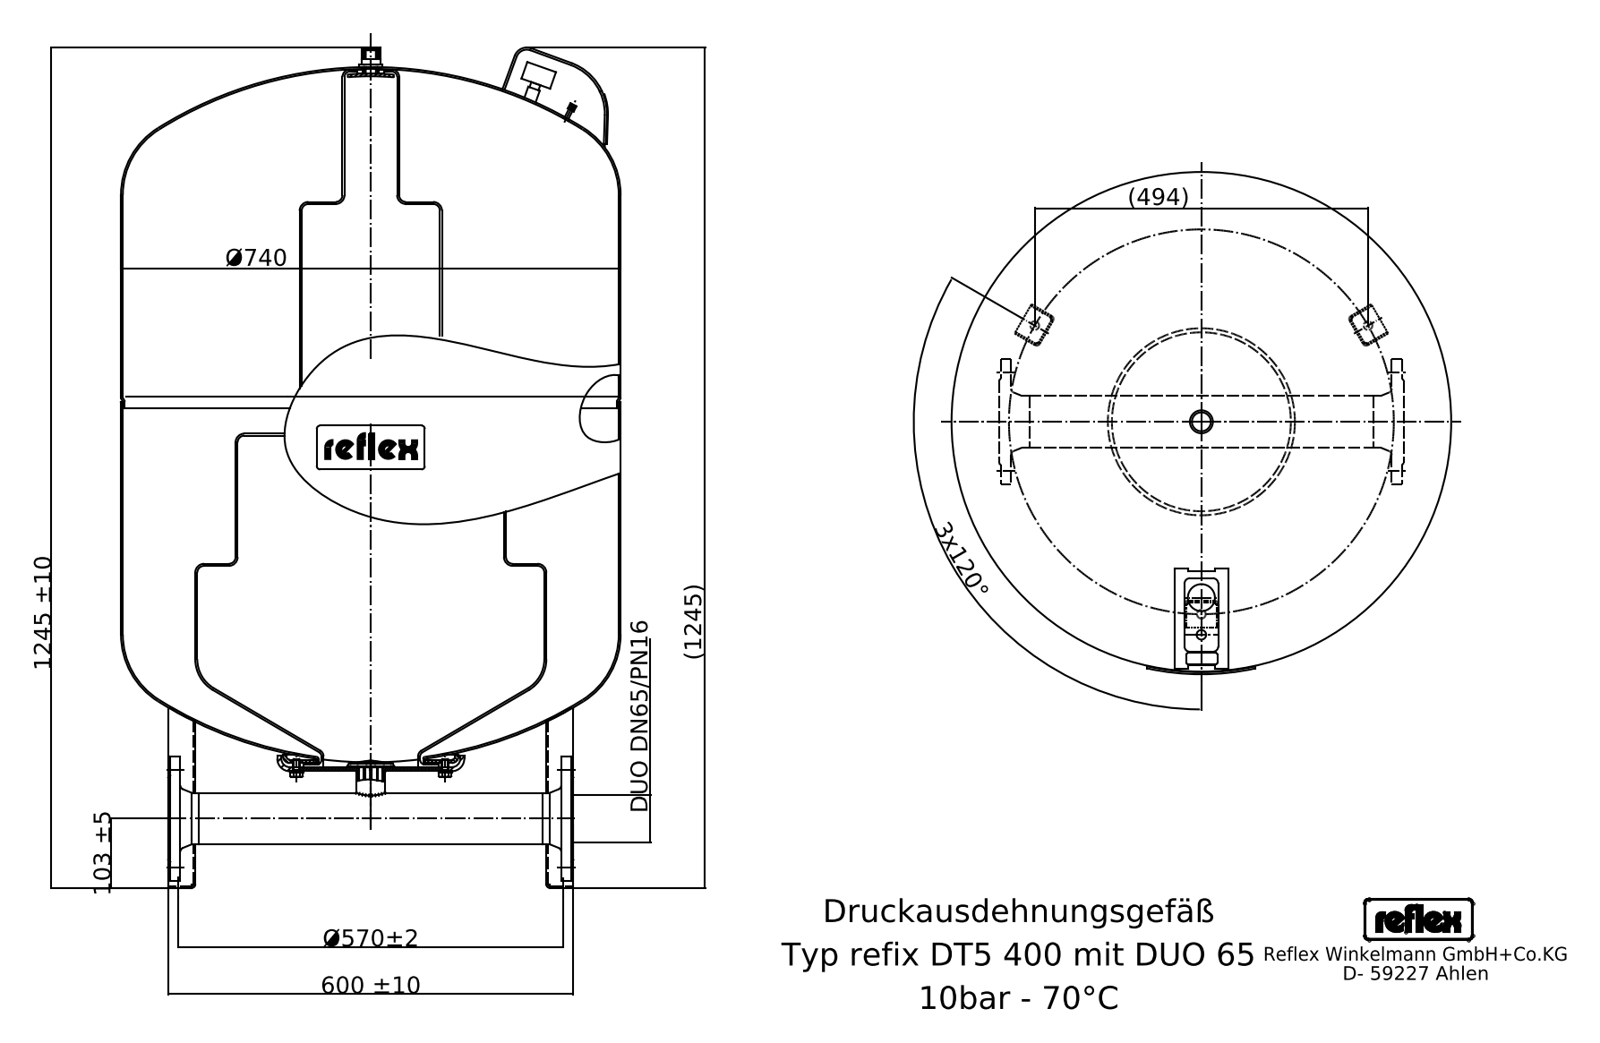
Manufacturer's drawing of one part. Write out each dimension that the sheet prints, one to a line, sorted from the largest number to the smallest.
(1245)
1245 ±10
Ø740
600 ±10
Ø570±2
(494)
3x120°
103 ±5
DUO DN65/PN16
